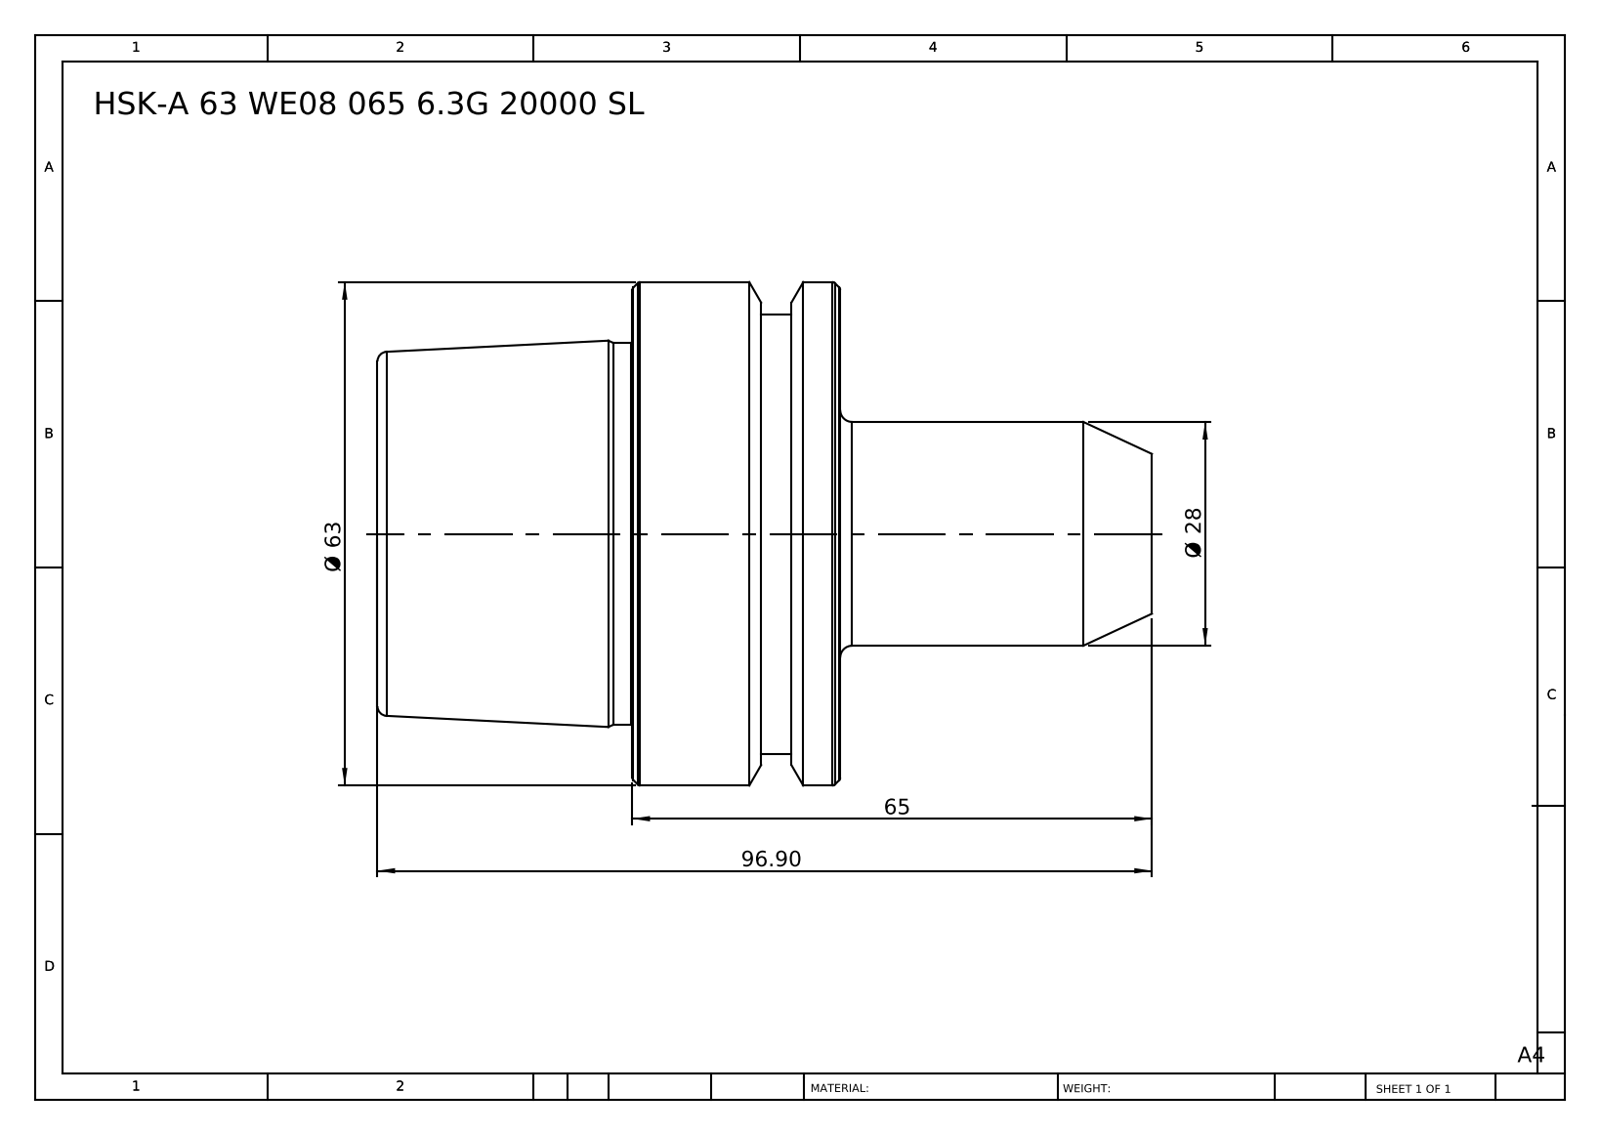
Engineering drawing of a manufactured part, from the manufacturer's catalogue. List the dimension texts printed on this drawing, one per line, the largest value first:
96.90
65
Ø 63
Ø 28
